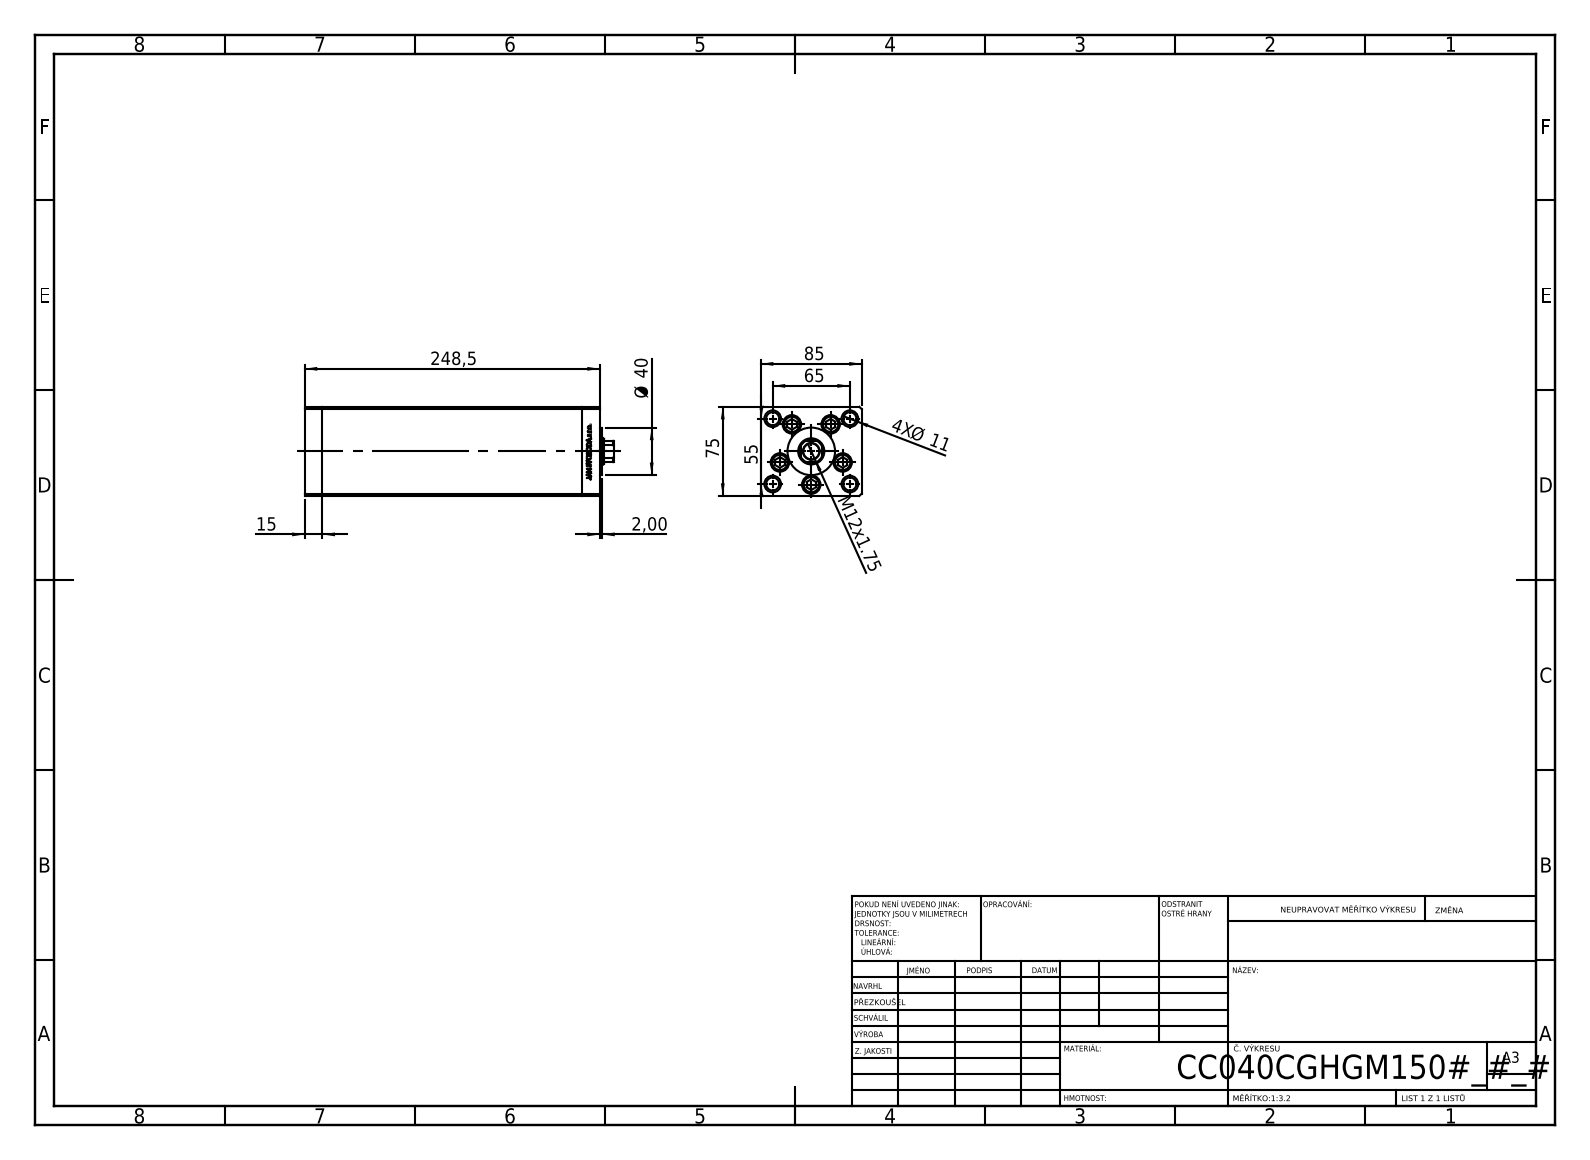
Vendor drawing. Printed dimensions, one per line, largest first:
248,5
85
75
65
55
Ø 40
15
M12x1.75
4X Ø 11
2,00
